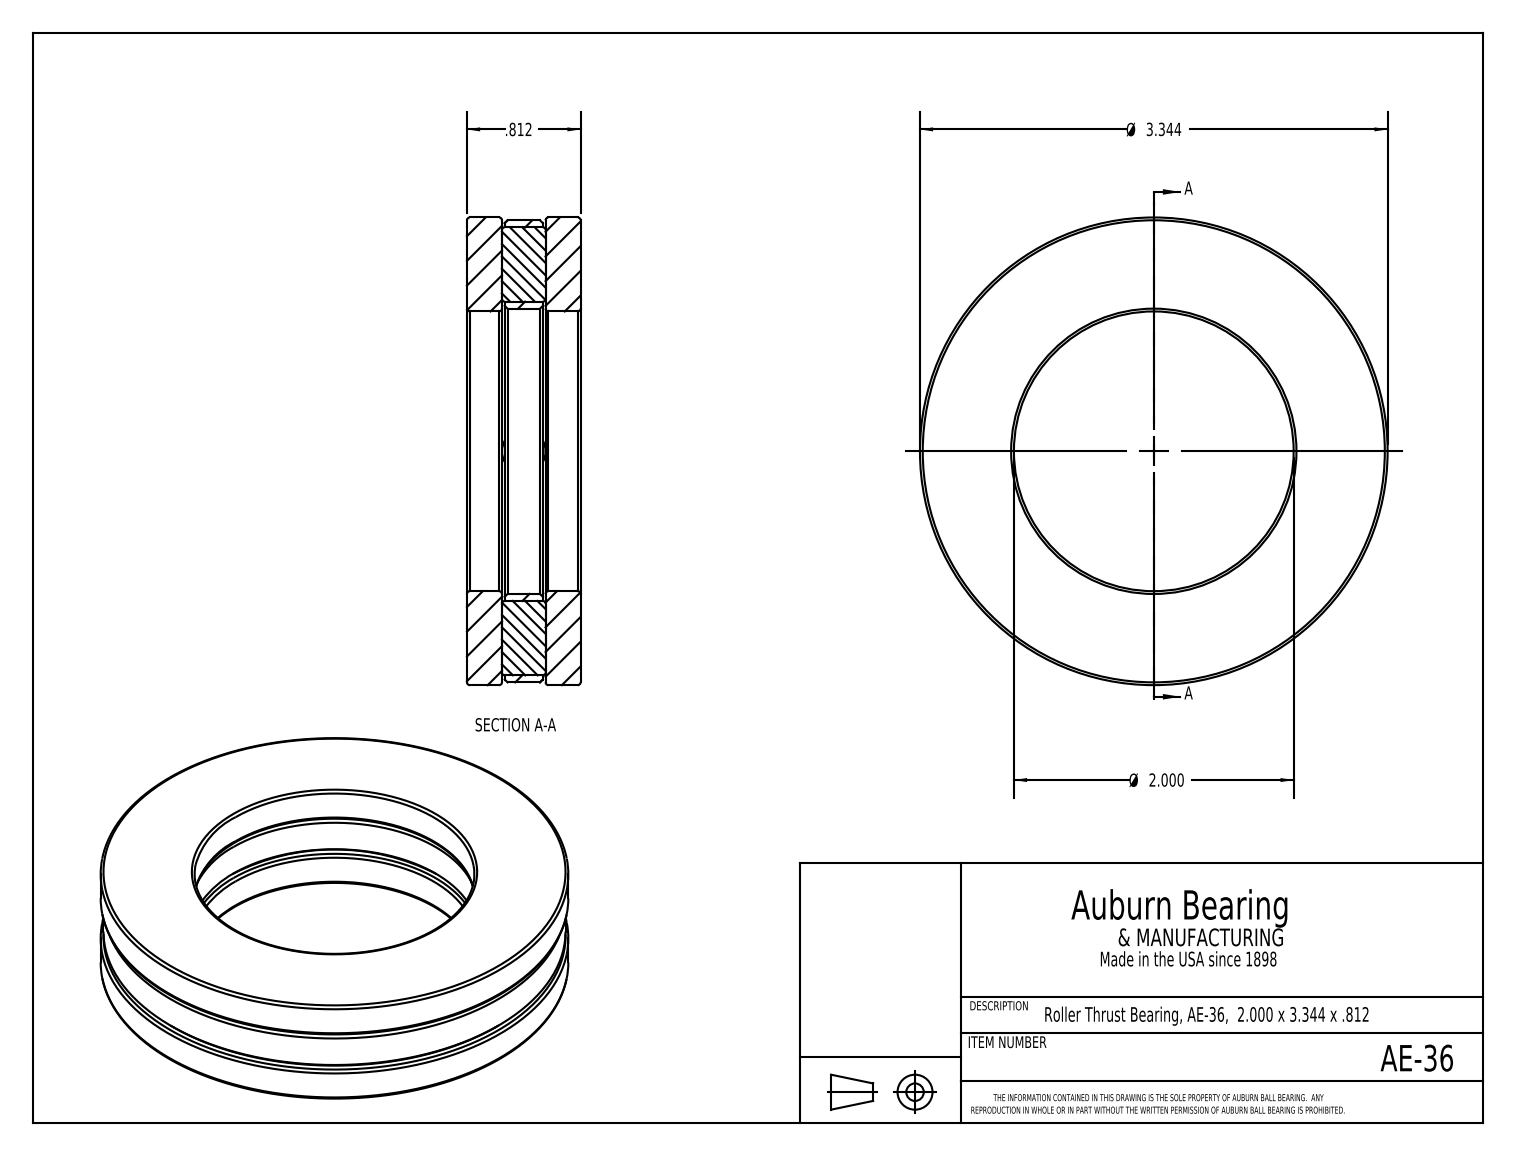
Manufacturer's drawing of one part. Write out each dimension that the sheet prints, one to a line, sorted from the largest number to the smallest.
Ø 3.344
Ø 2.000
.812
